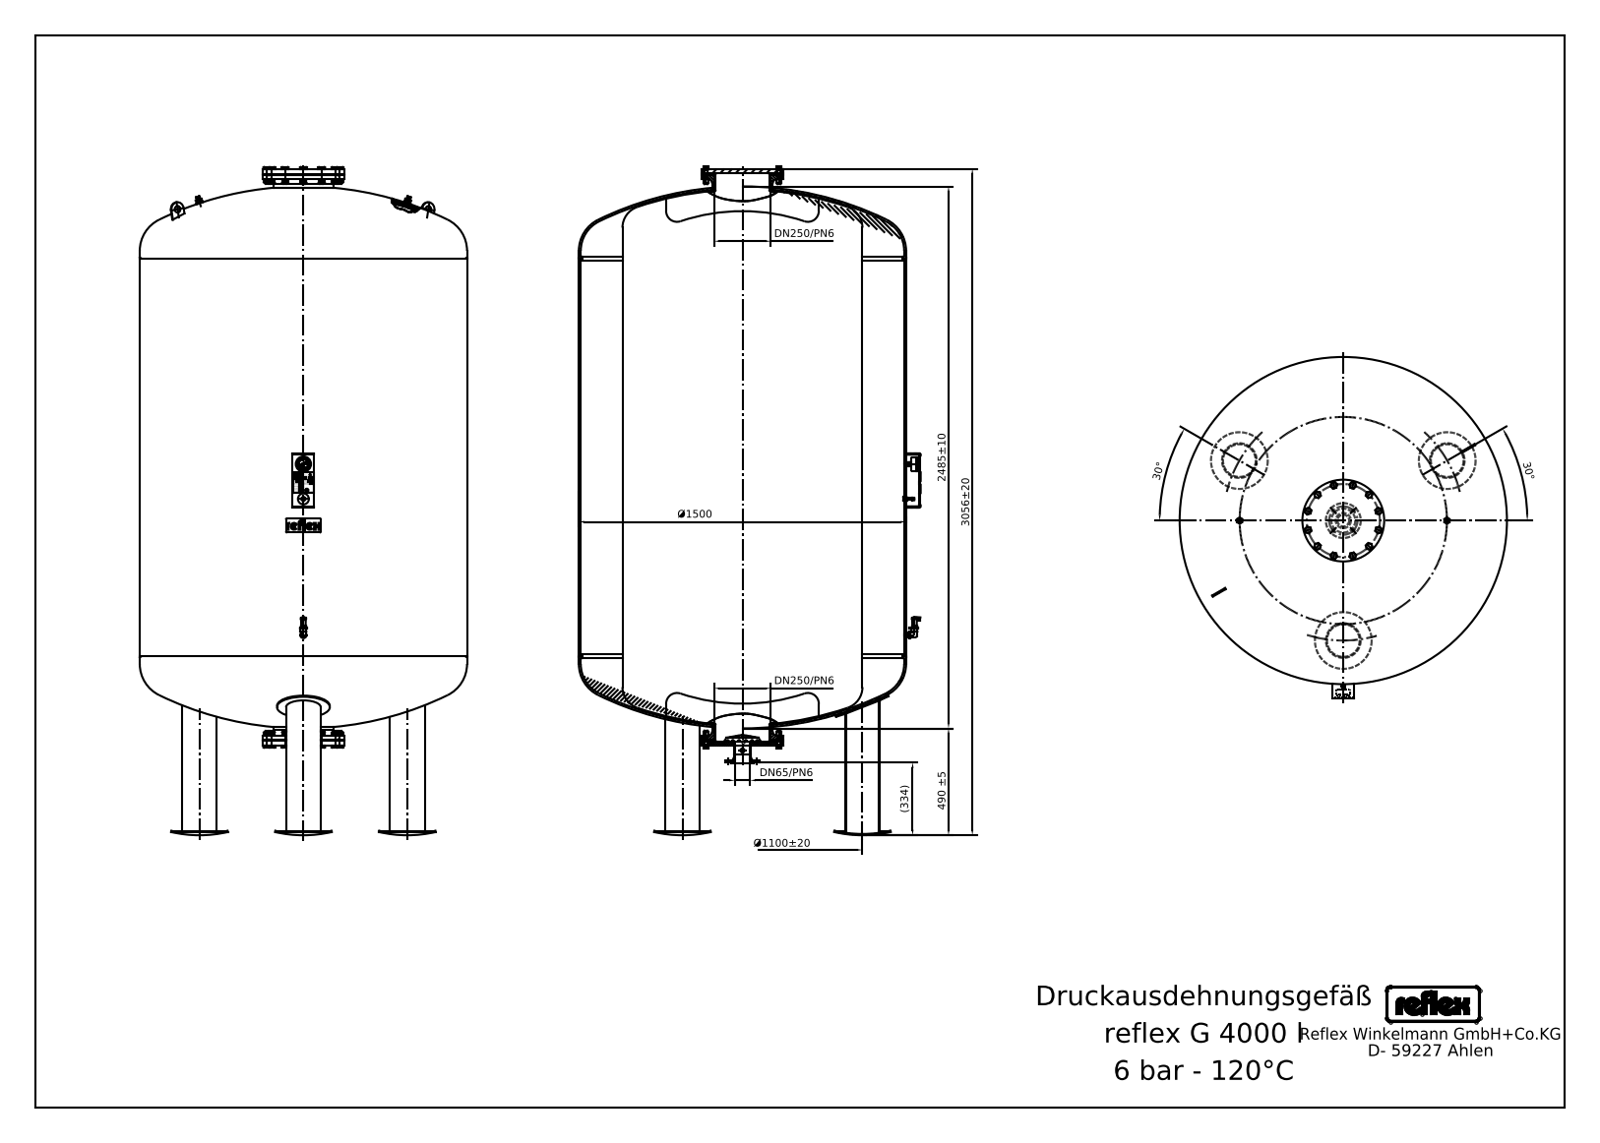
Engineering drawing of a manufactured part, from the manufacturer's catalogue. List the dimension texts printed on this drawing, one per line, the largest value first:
3056±20
2485±10
Ø1500
Ø1100±20
490 ±5
(334)
DN250/PN6
DN250/PN6
DN65/PN6
30°
30°
